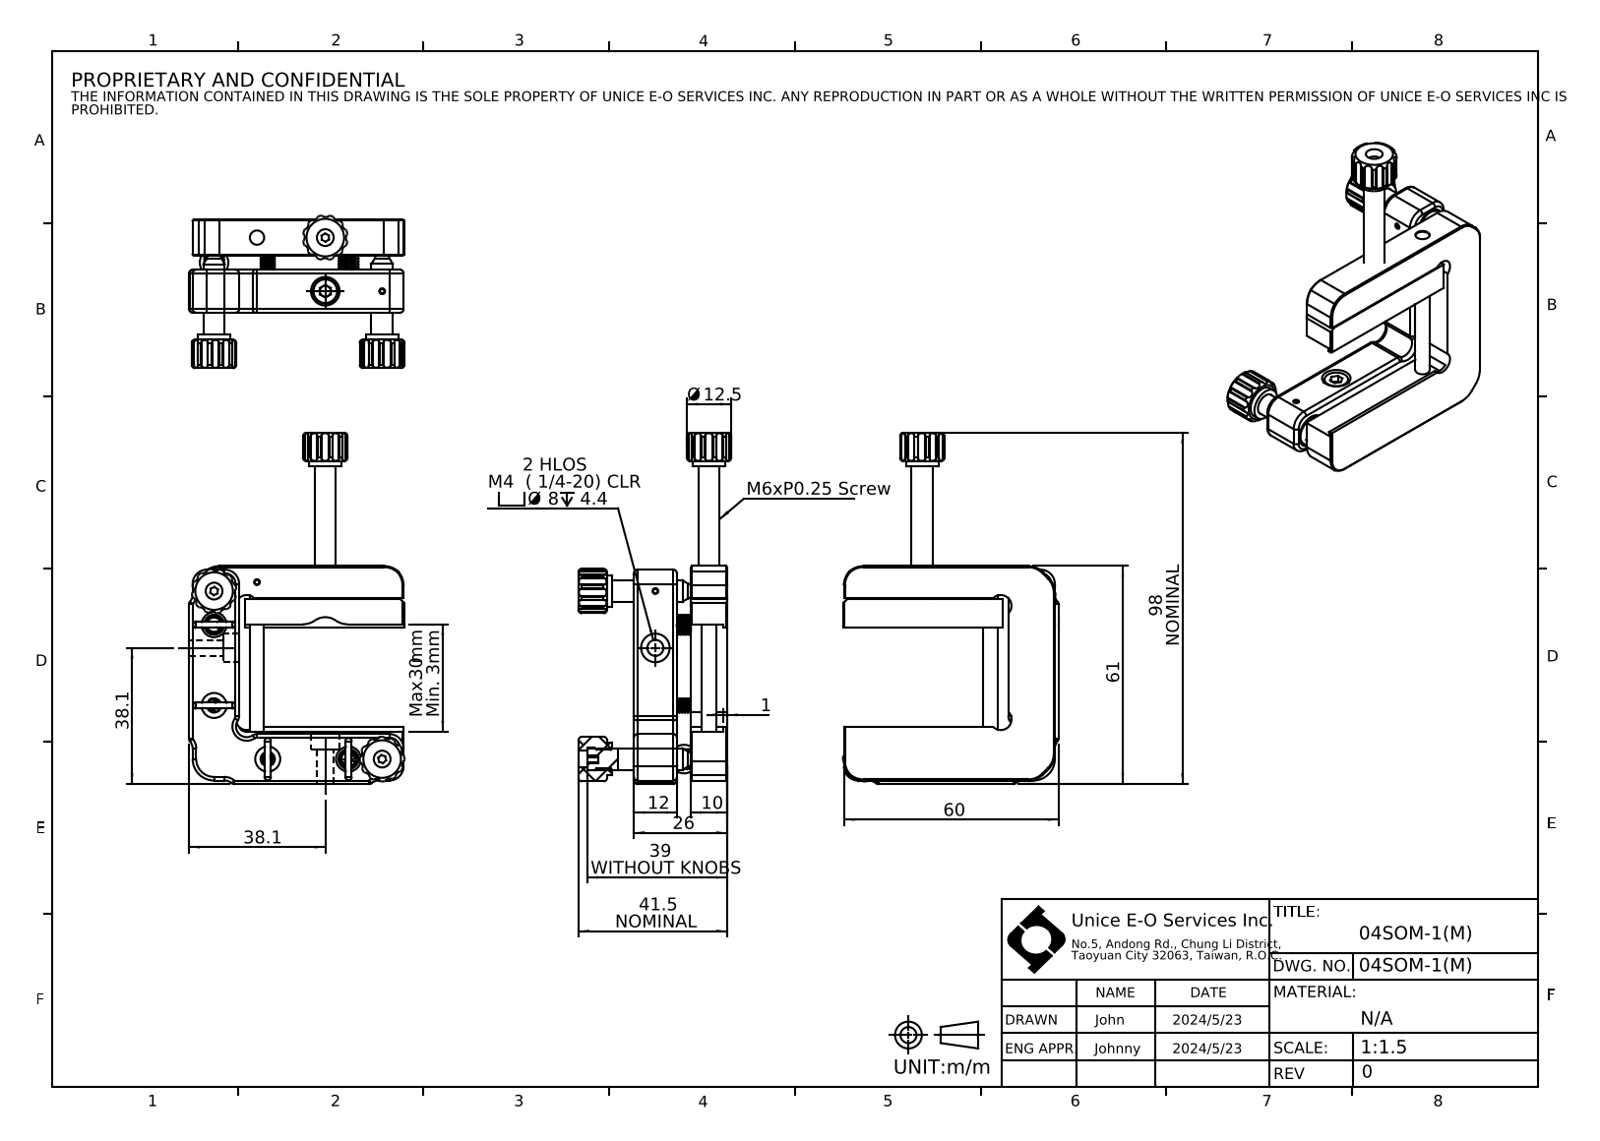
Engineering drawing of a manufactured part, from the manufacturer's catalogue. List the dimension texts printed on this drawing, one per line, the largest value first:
98 NOMINAL
61
60
41.5 NOMINAL
39 WITHOUT KNOBS
38.1
38.1
Max. 30 mm Min. 3mm
26
Ø 12.5
12
10
2 HLOS M4 ( 1/4-20) CLR Ø 8 4.4
1
